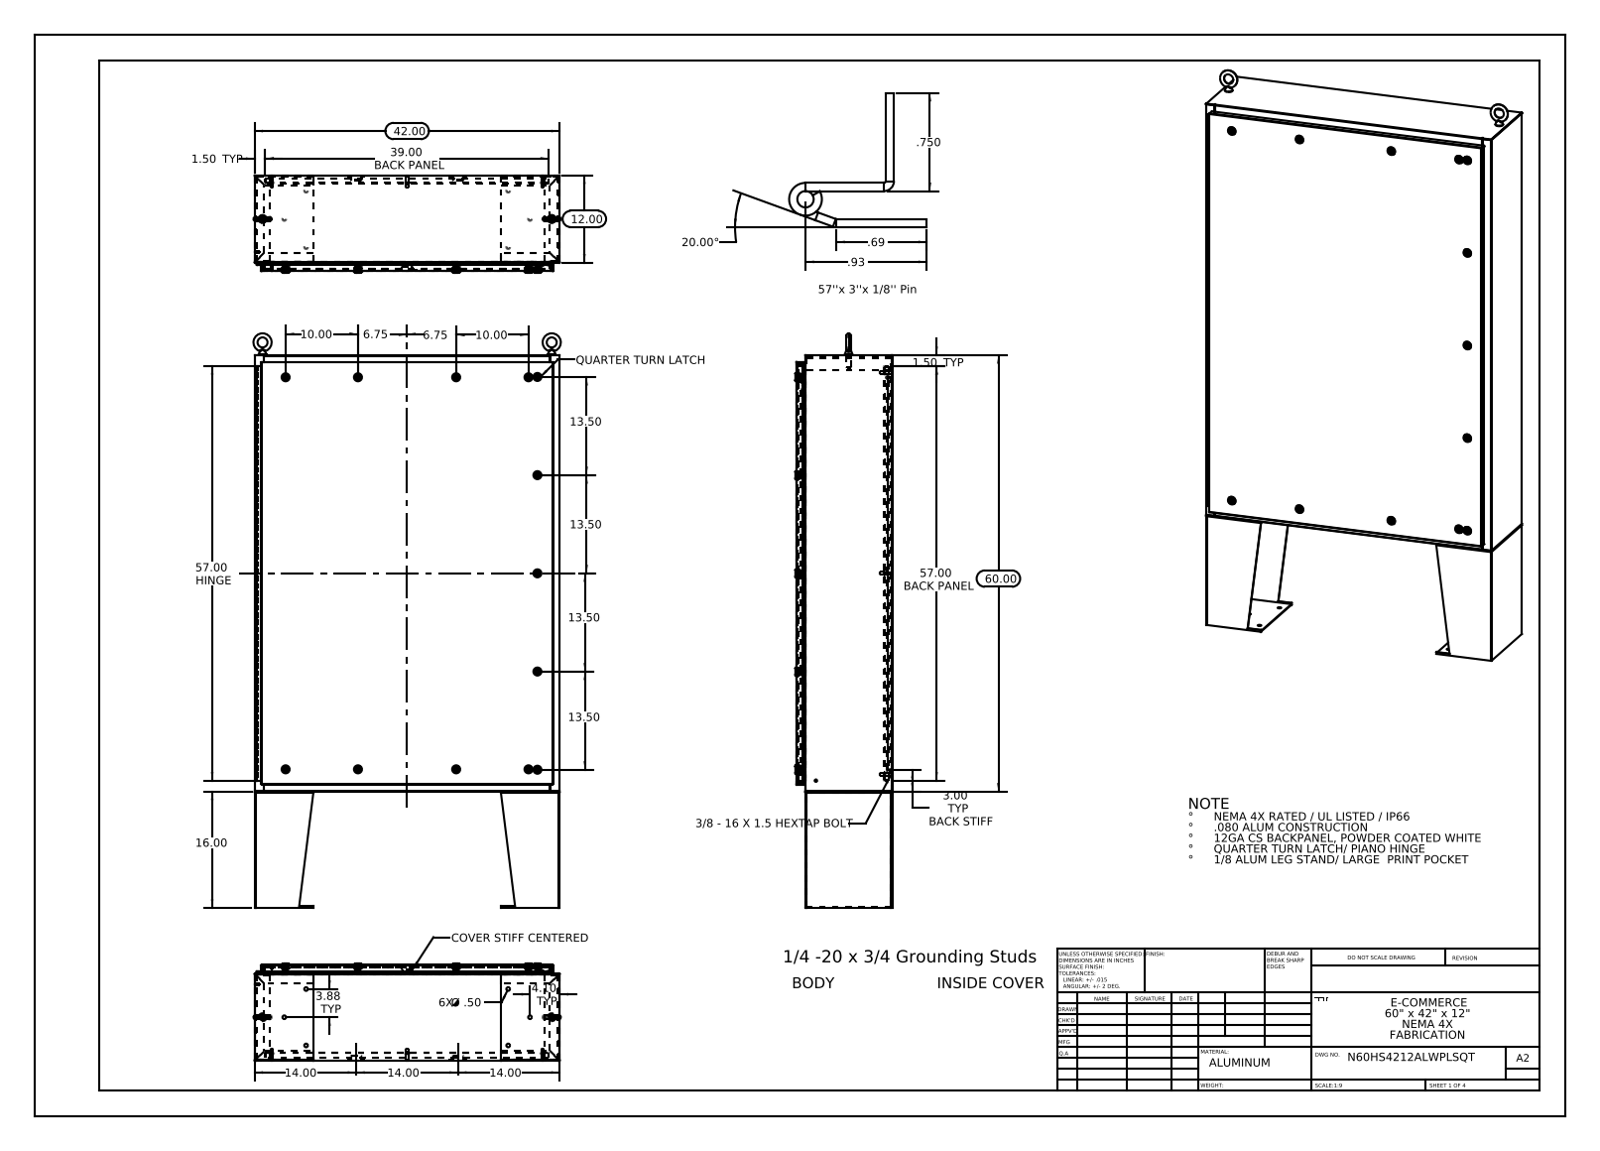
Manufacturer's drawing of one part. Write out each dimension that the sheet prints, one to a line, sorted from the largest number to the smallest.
60.00
57.00 HINGE
57.00 BACK PANEL
42.00
39.00 BACK PANEL
20.00°
16.00
14.00
14.00
14.00
13.50
13.50
13.50
13.50
12.00
10.00
10.00
6.75
6.75
4.10 TYP
3.88 TYP
3.00 TYP BACK STIFF
1.50 TYP
1.50 TYP
.93
.750
.69
6X Ø .50
